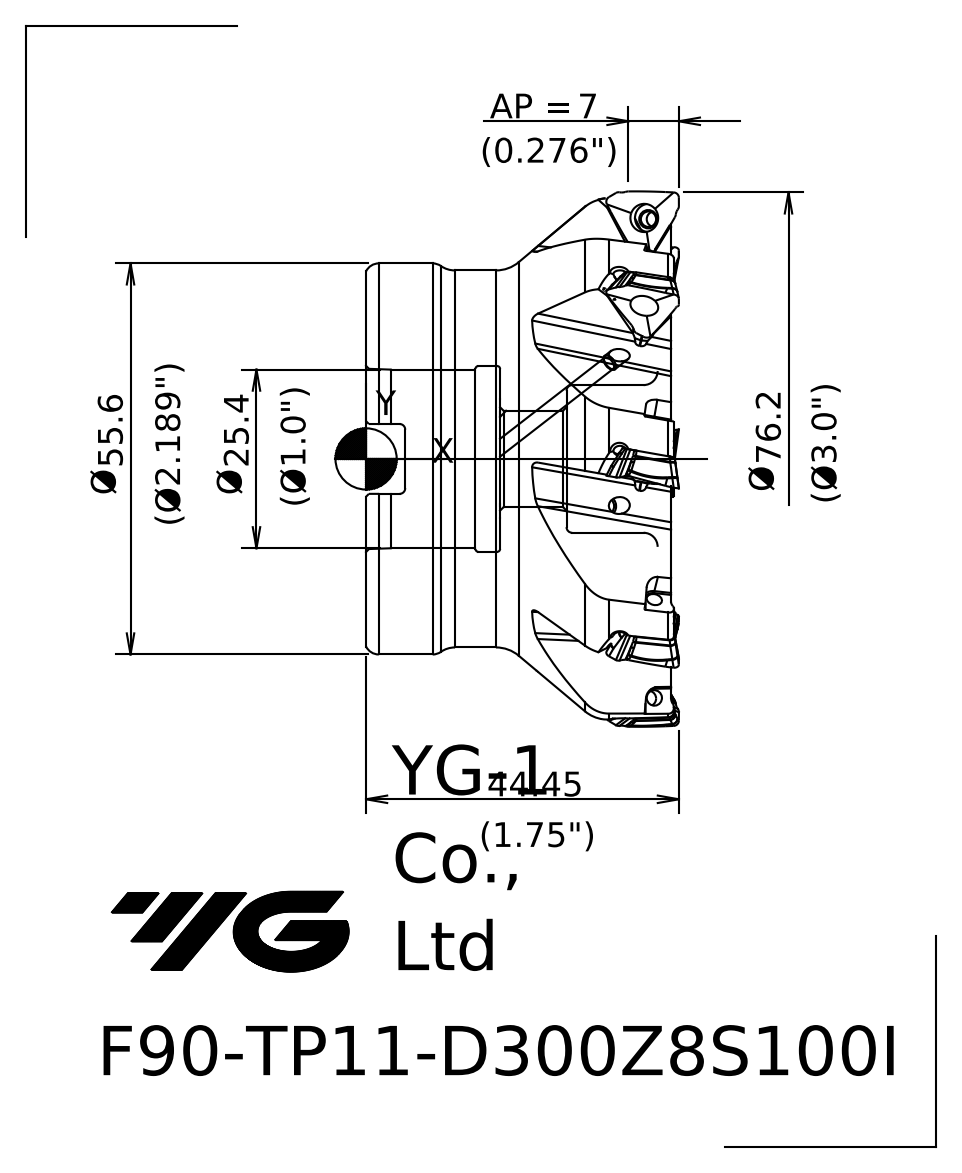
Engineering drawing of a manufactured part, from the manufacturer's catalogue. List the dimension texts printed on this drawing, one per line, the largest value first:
76.2 Ø
44.45
25.4 Ø
AP = 7
